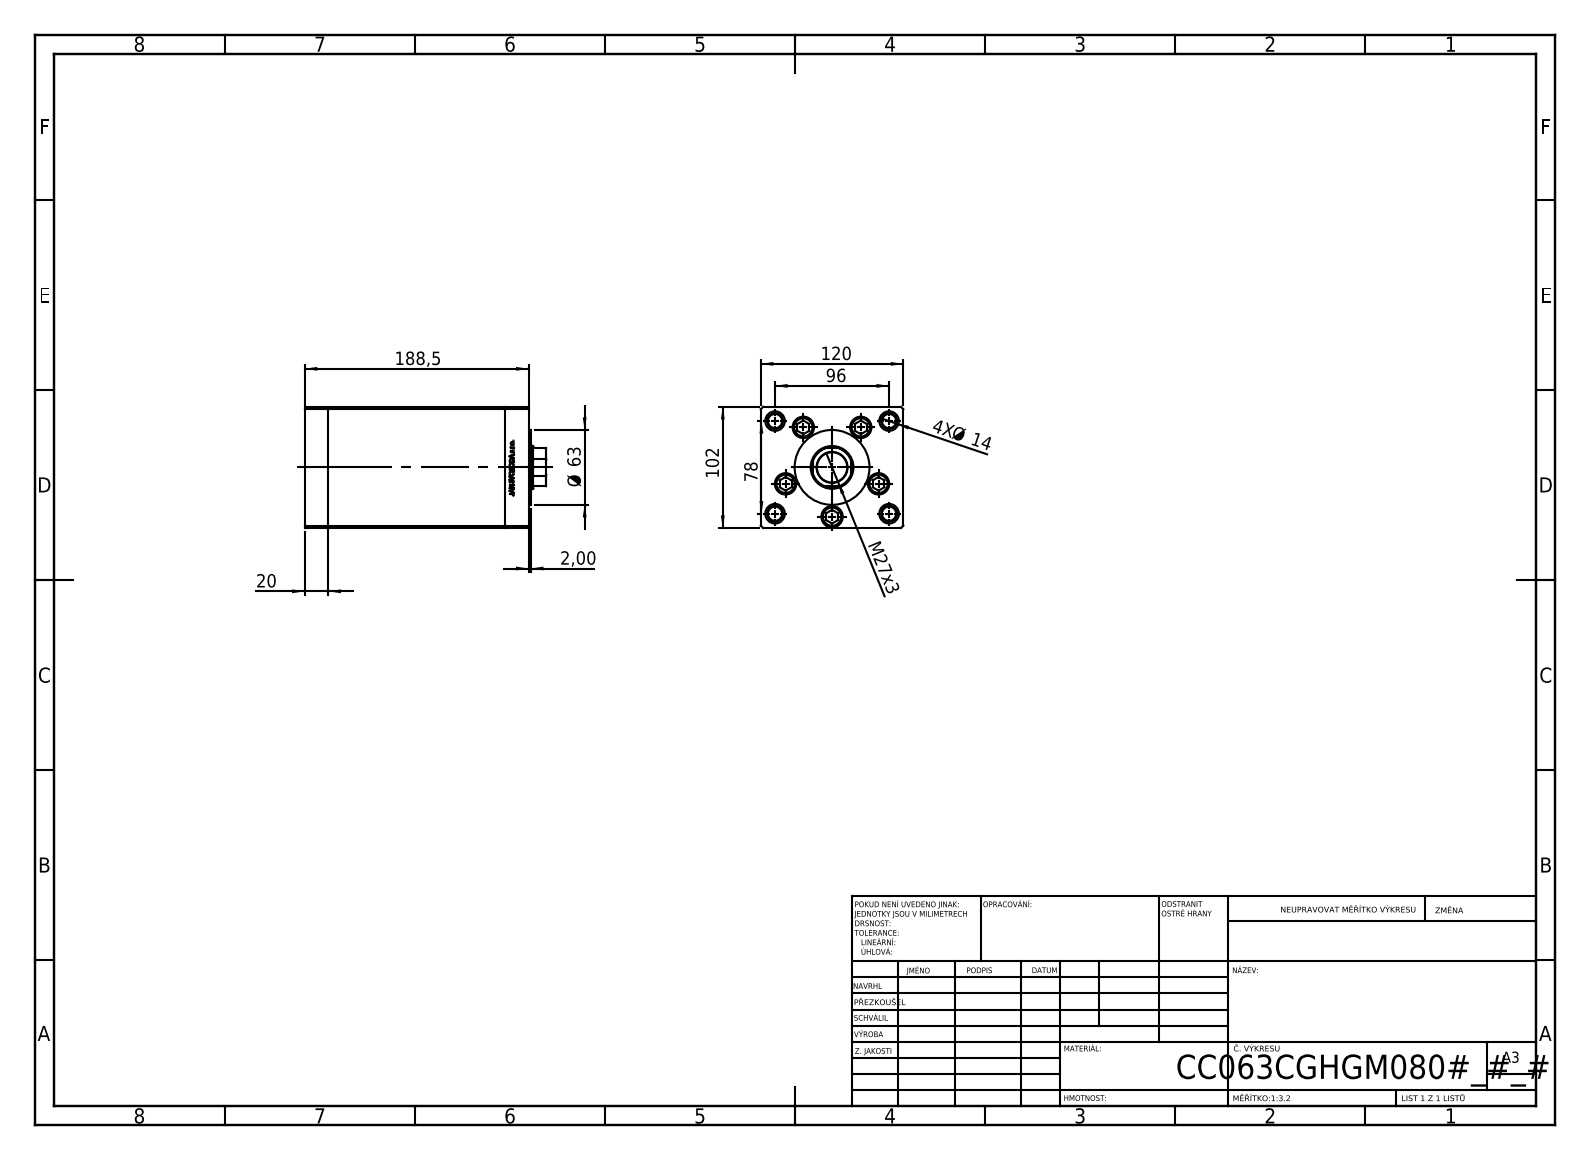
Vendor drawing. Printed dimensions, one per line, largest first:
188,5
120
102
96
78
Ø 63
M27x3
20
4X Ø 14
2,00
